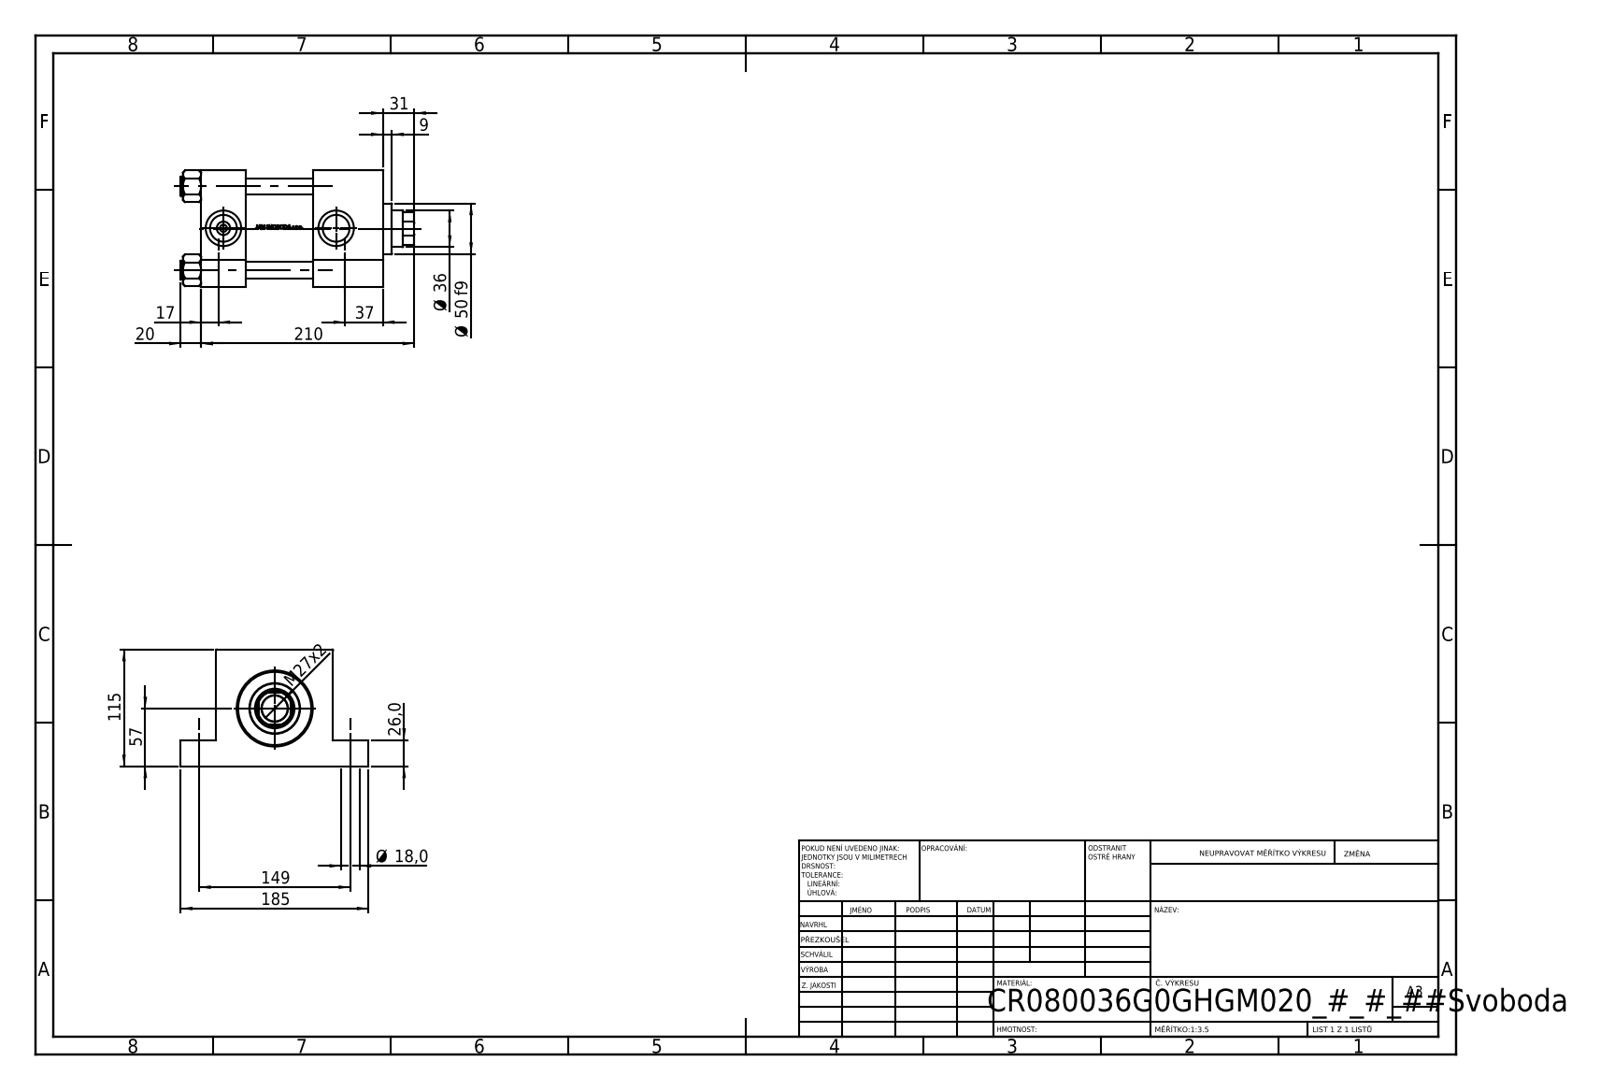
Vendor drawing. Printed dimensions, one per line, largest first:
210
185
149
115
57
Ø 50 f9
37
Ø 36
31
M27x2
26,0
20
Ø 18,0
17
9
